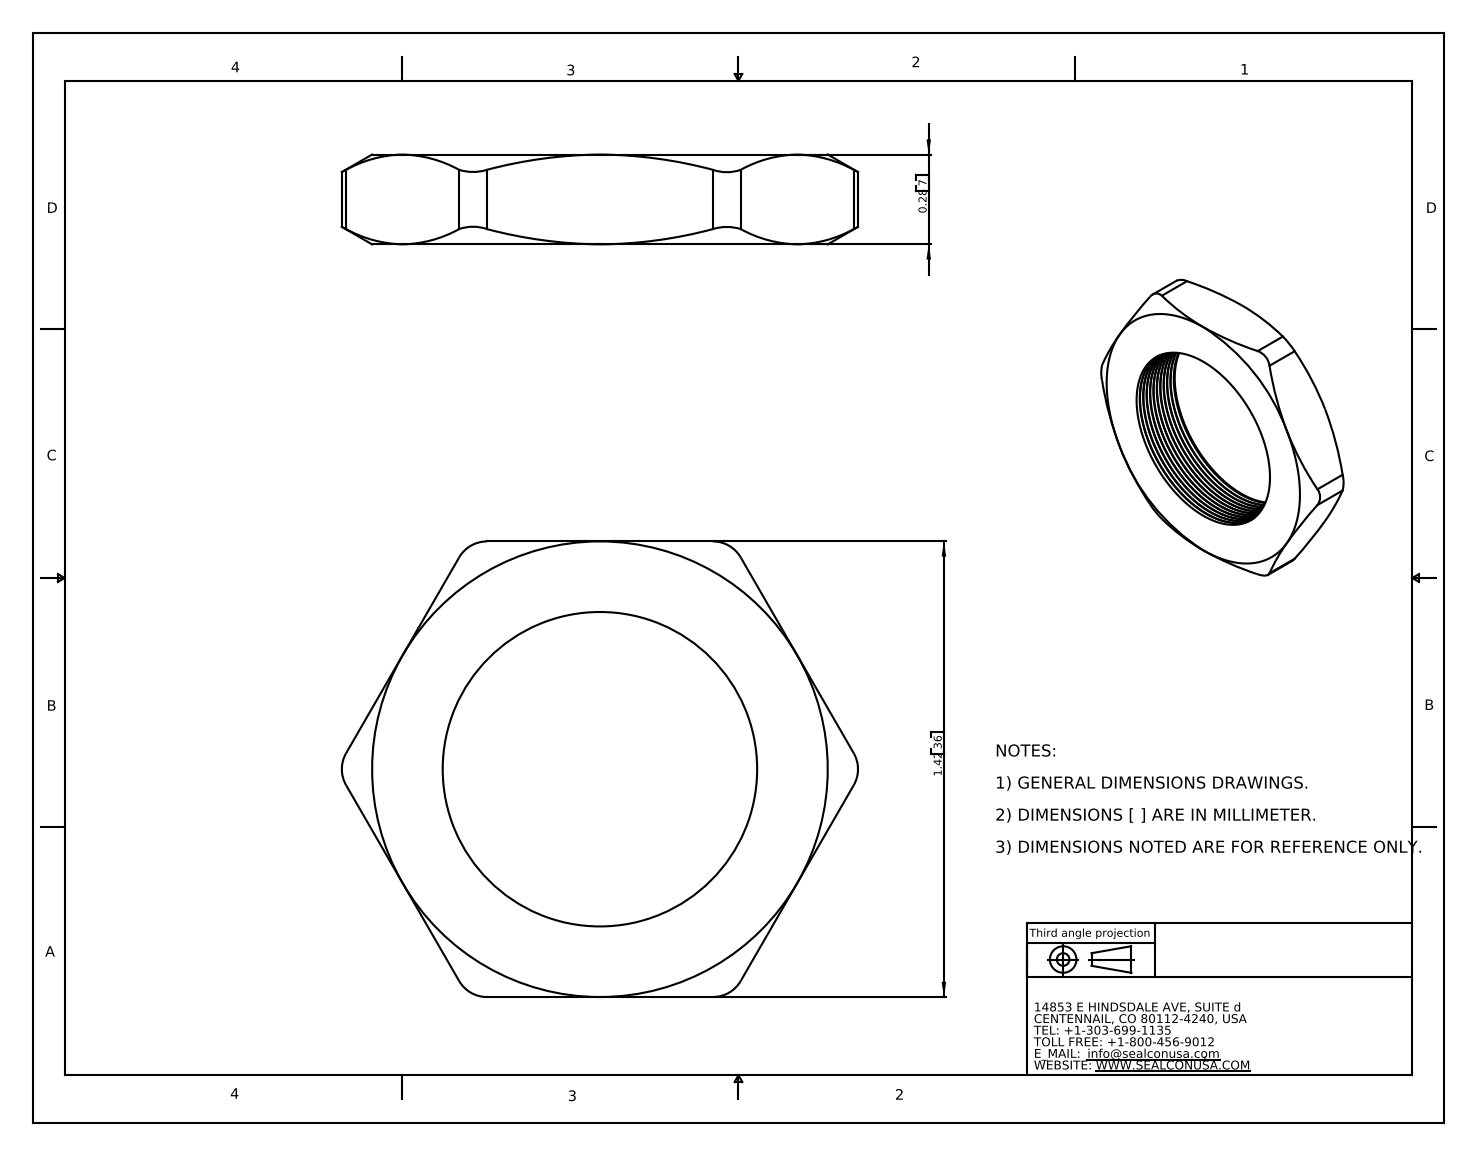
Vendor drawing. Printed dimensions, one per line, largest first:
1.42 36
0.28 7
